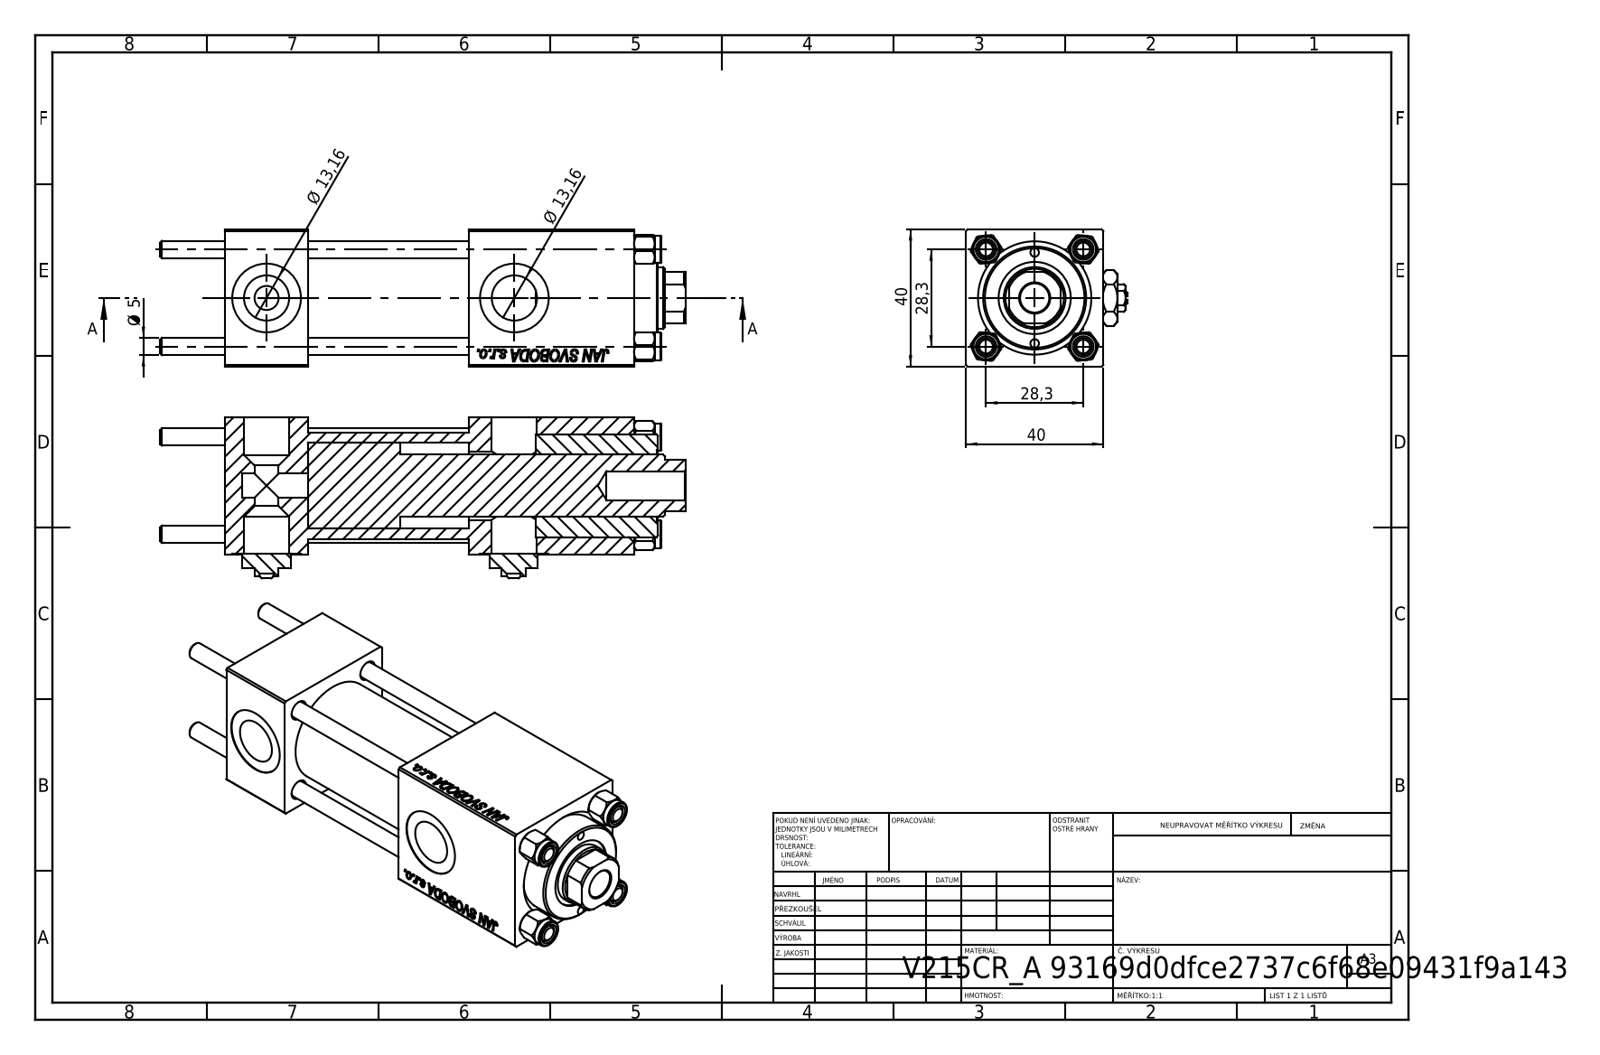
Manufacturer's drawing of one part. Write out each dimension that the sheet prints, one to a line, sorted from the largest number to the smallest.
40
40
28,3
28,3
Ø 13,16
Ø 13,16
Ø 5
